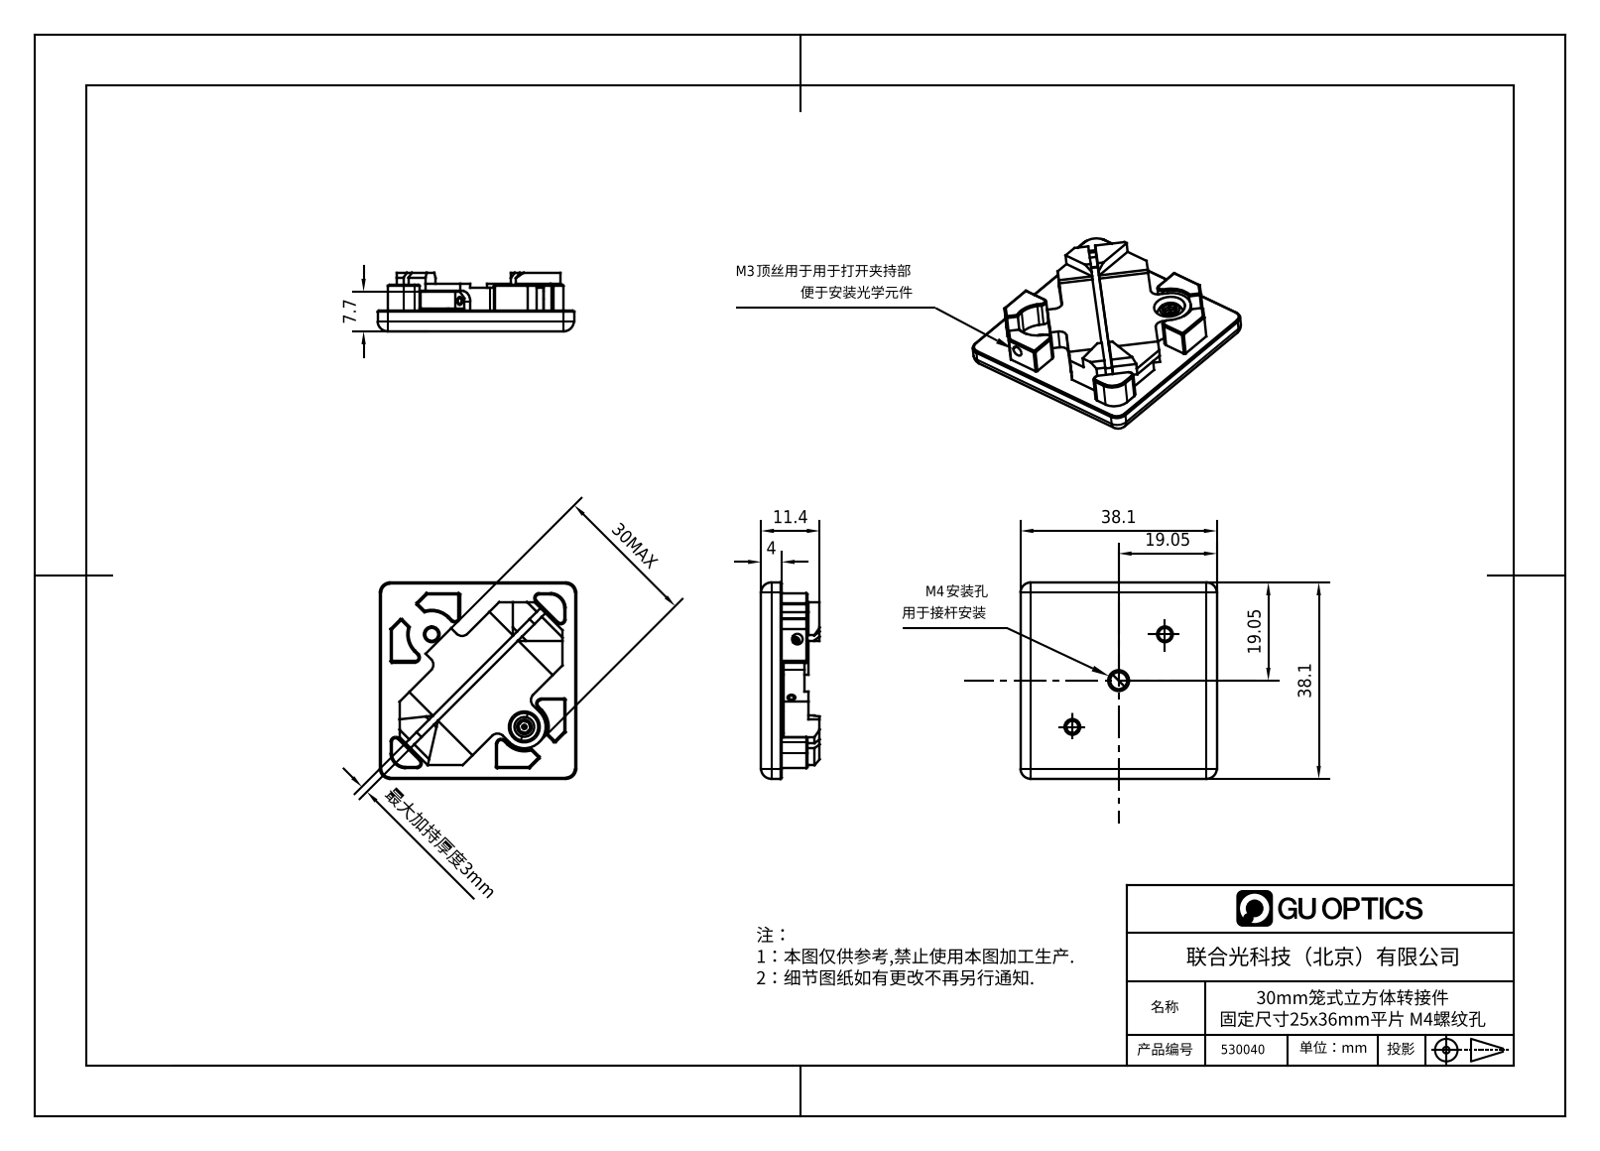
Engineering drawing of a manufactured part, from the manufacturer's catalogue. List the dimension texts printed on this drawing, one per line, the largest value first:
38.1
38.1
30MAX
19.05
19.05
11.4
7.7
4
最大加持厚度3mm
